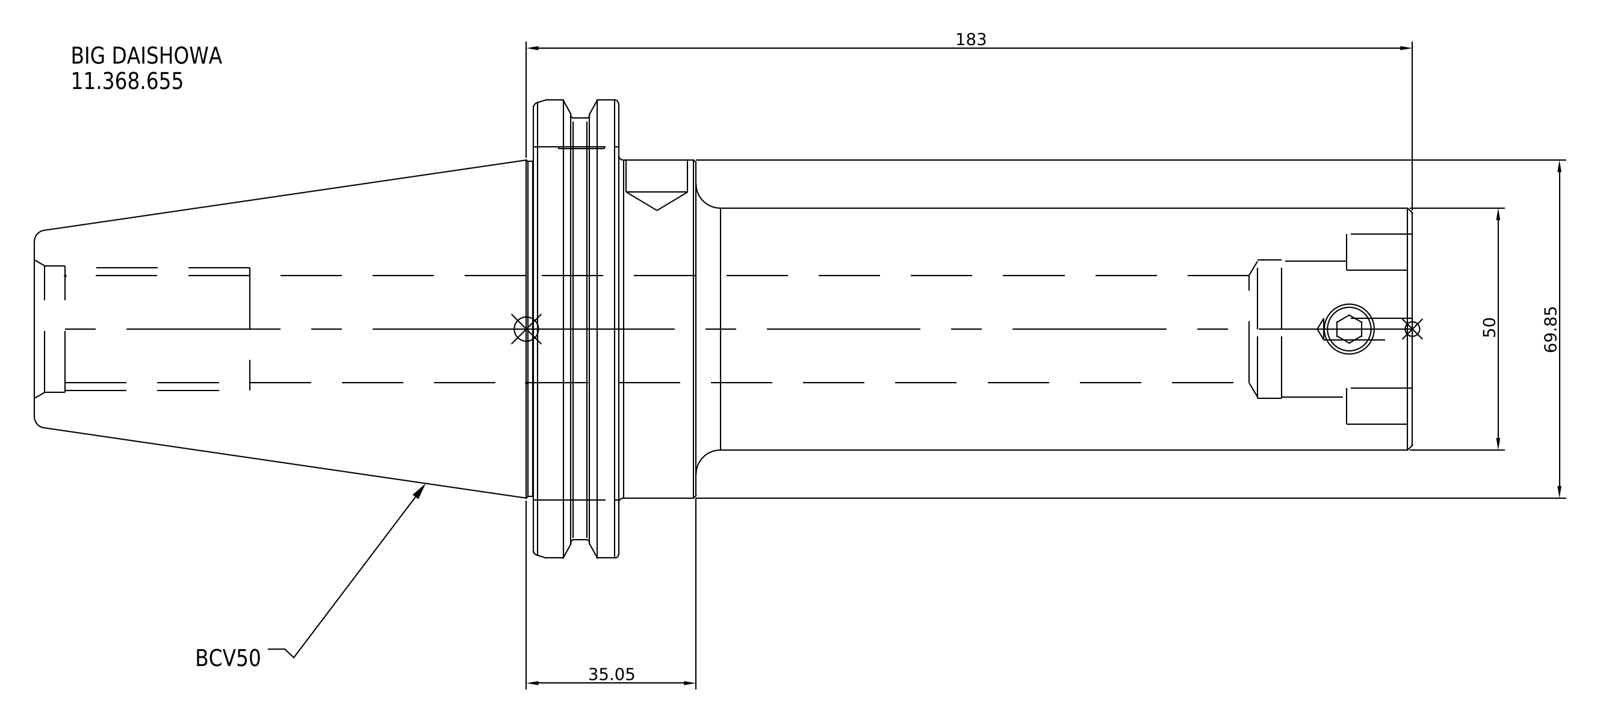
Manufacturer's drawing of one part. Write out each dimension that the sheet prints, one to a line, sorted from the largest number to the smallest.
183
69.85
50
35.05
